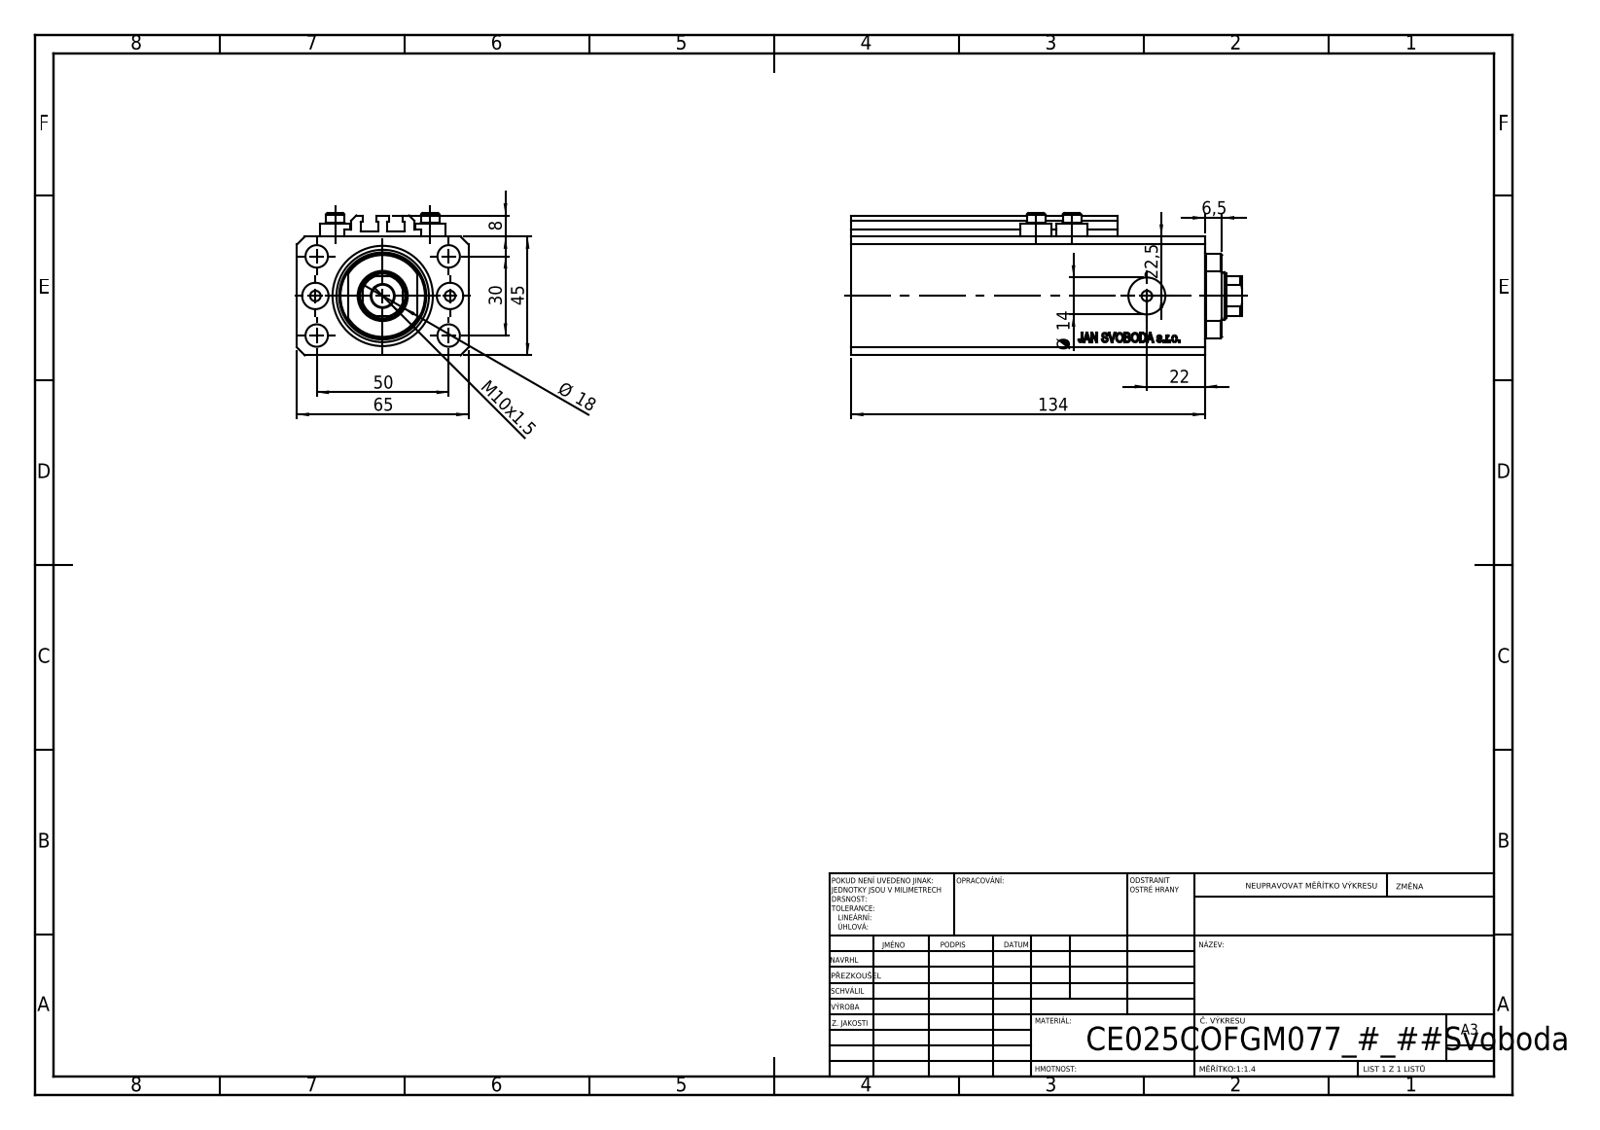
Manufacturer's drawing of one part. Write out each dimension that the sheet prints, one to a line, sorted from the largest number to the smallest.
134
65
50
45
30
22,5
22
Ø 18
Ø 14
M10x1.5
8
6,5
